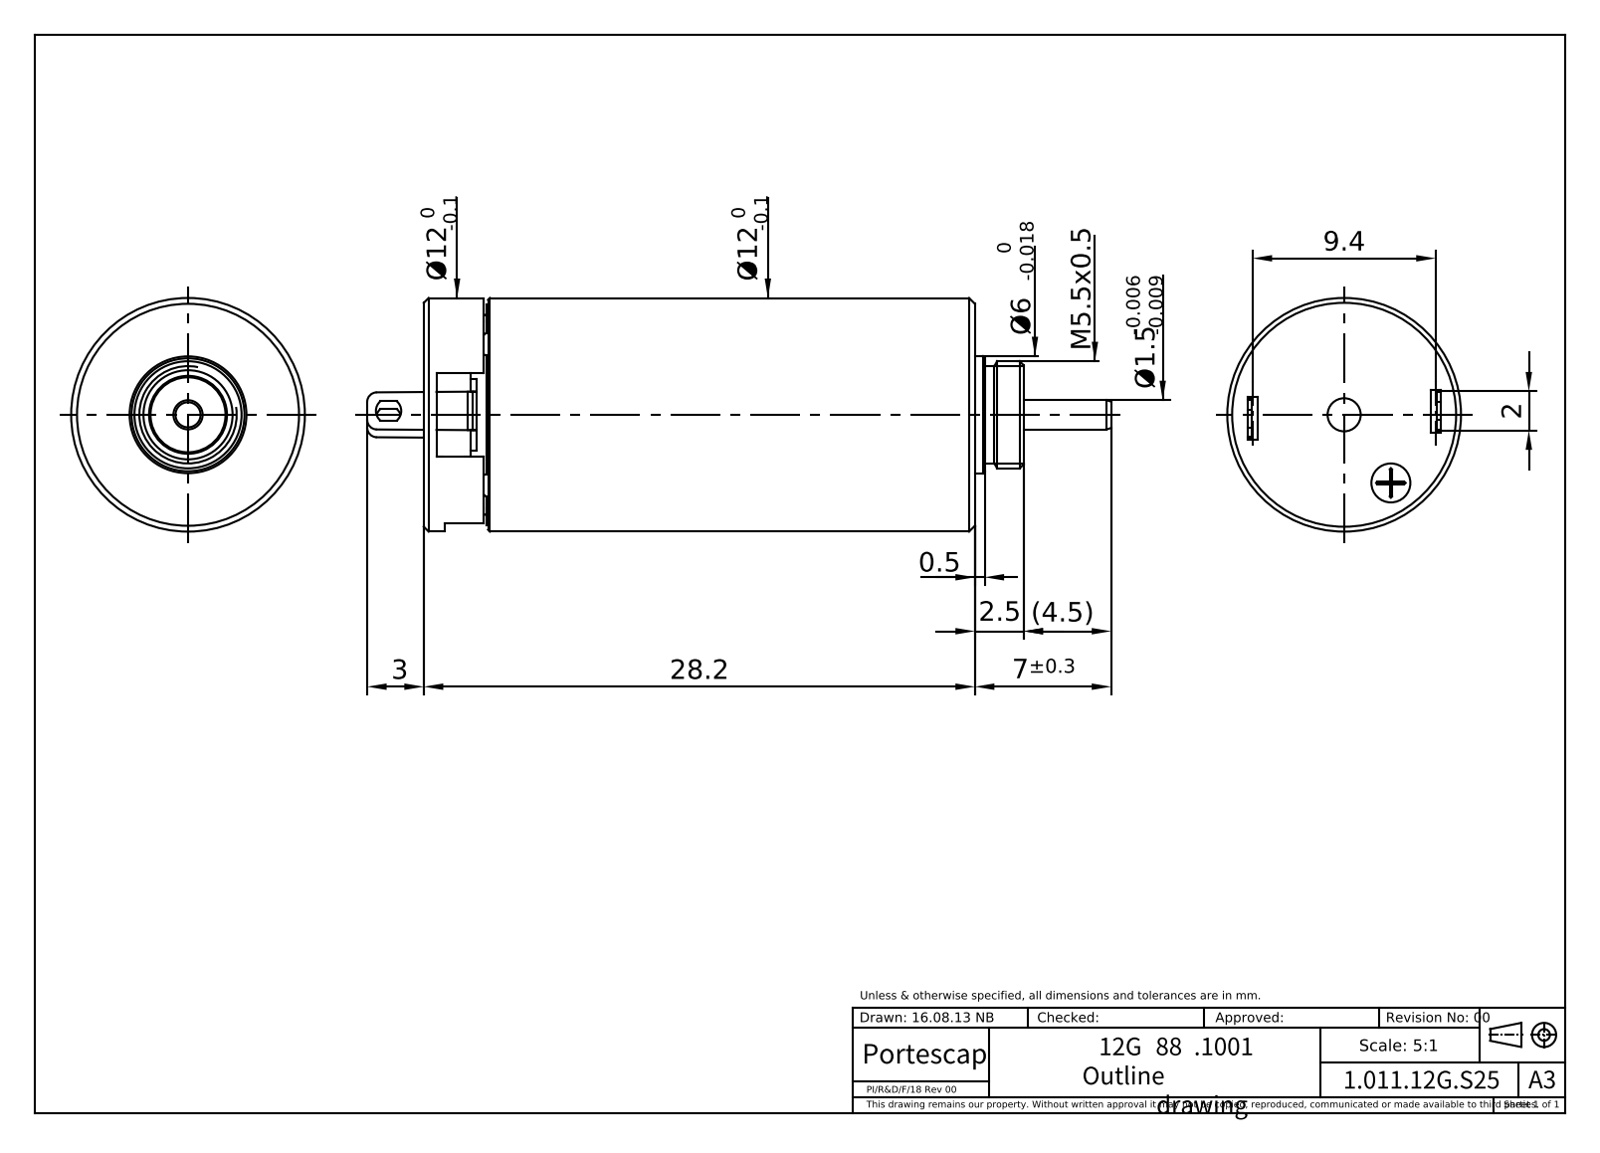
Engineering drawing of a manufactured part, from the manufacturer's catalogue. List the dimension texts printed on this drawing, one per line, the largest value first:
28.2
9.4
7±0.3
(4.5)
3
2.5
2
0.5
